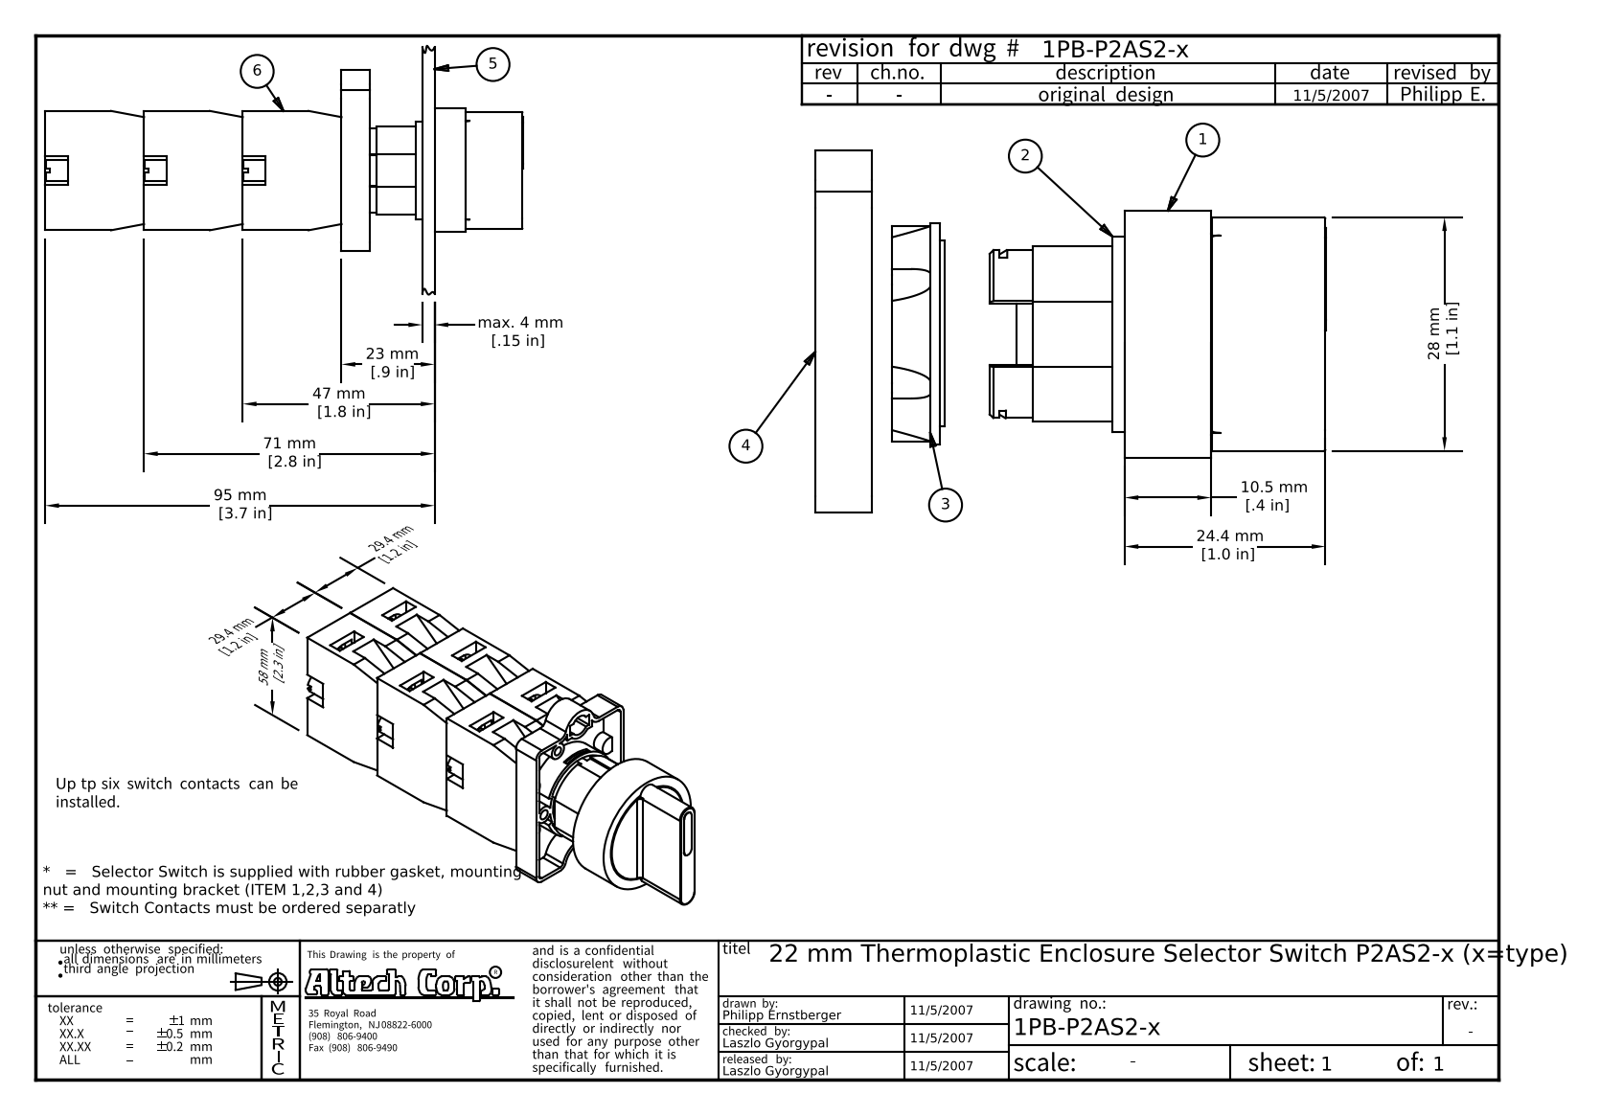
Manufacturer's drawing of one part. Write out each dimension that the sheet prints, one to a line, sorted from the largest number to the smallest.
95 mm [3.7 in]
71 mm [2.8 in]
58 mm [2.3 in]
47 mm [1.8 in]
29.4 mm [1.2 in]
29.4 mm [1.2 in]
28 mm [1.1 in]
24.4 mm [1.0 in]
23 mm [.9 in]
10.5 mm [.4 in]
max. 4 mm [.15 in]
